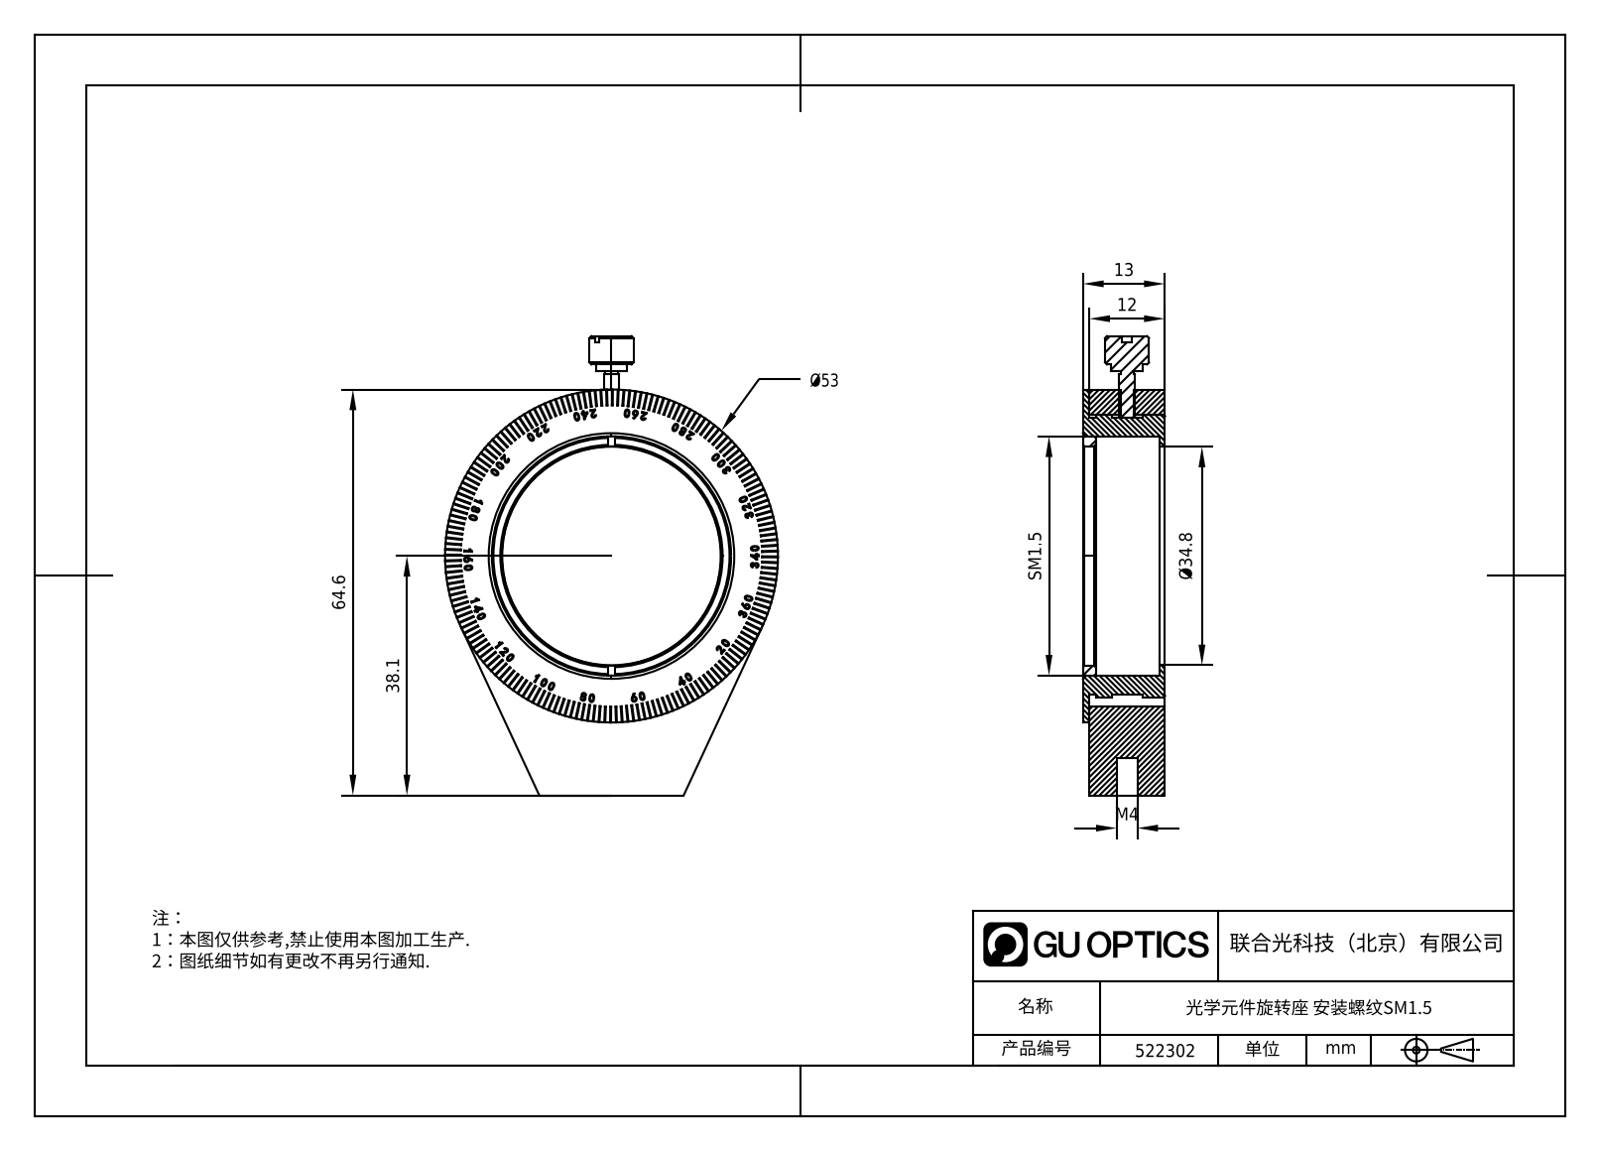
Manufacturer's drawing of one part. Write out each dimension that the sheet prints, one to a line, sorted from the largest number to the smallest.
64.6
38.1
Ø34.8
13
12
M4
SM1.5
